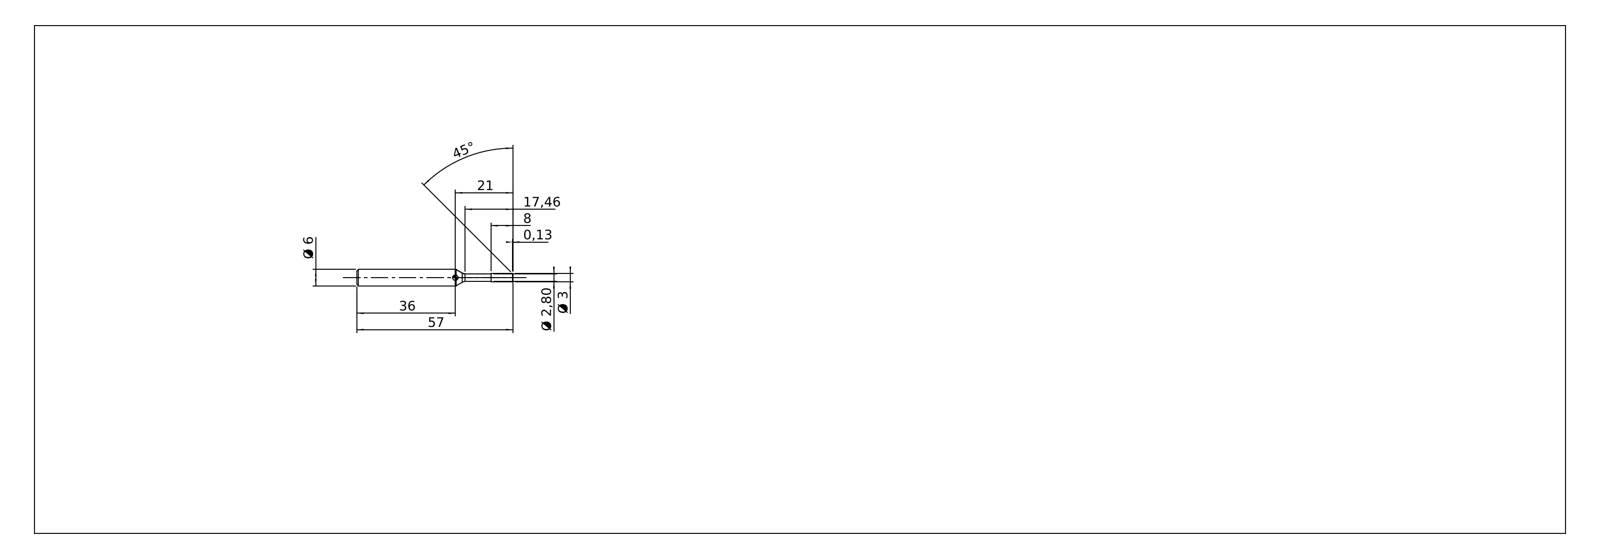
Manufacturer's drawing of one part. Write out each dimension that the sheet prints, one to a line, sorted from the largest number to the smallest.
57
45°
36
21
17,46
8
Ø 6
Ø 3
Ø 2,80
0,13
